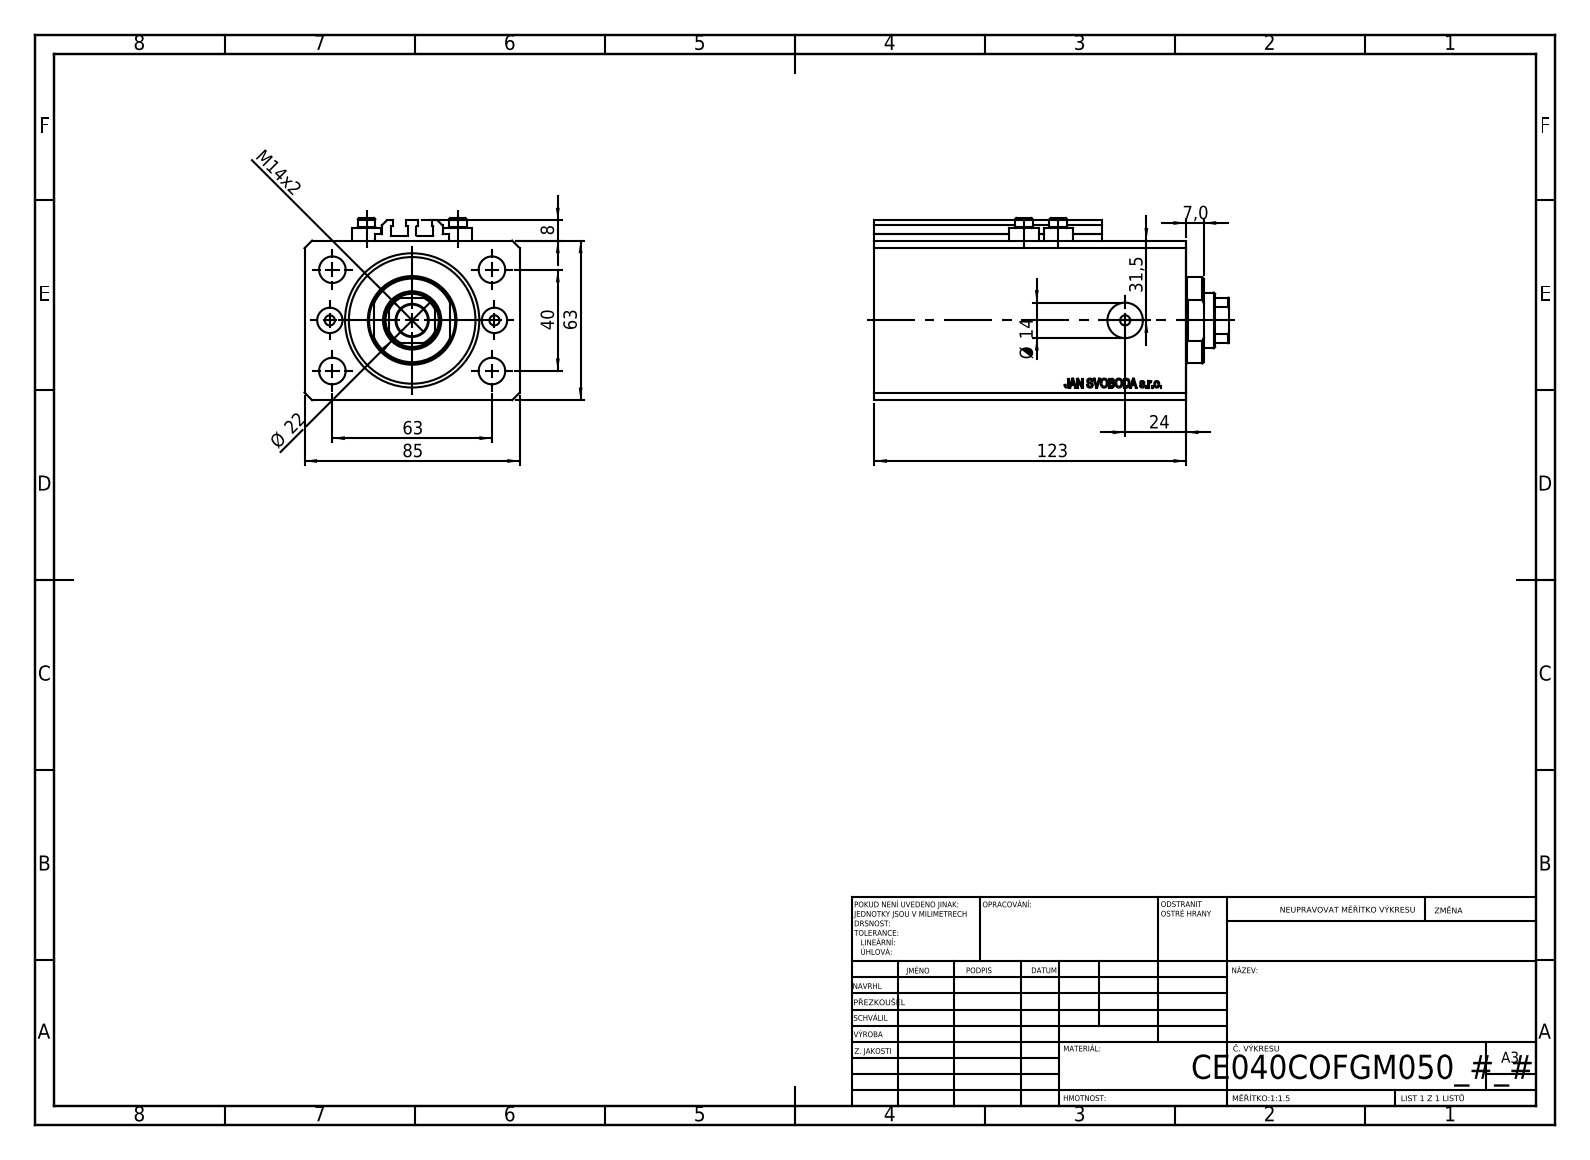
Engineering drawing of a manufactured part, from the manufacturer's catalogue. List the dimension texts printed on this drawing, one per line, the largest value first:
123
85
63
63
40
31,5
24
Ø 22
M14x2
Ø 14
8
7,0
